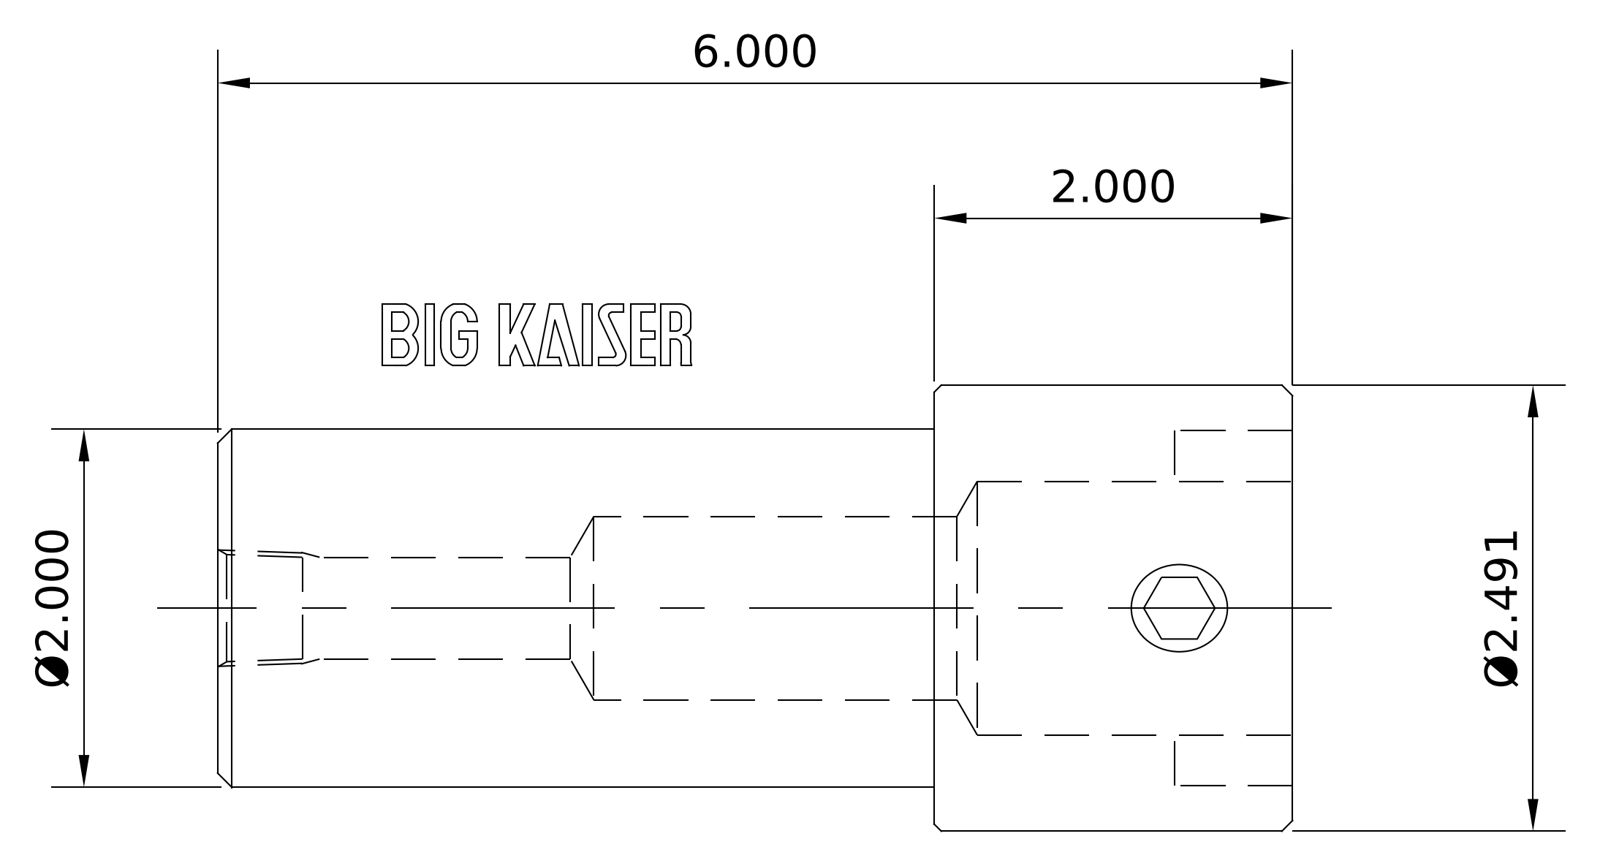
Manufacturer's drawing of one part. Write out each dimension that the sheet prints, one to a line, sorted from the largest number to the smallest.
6.000
Ø2.491
Ø2.000
2.000
